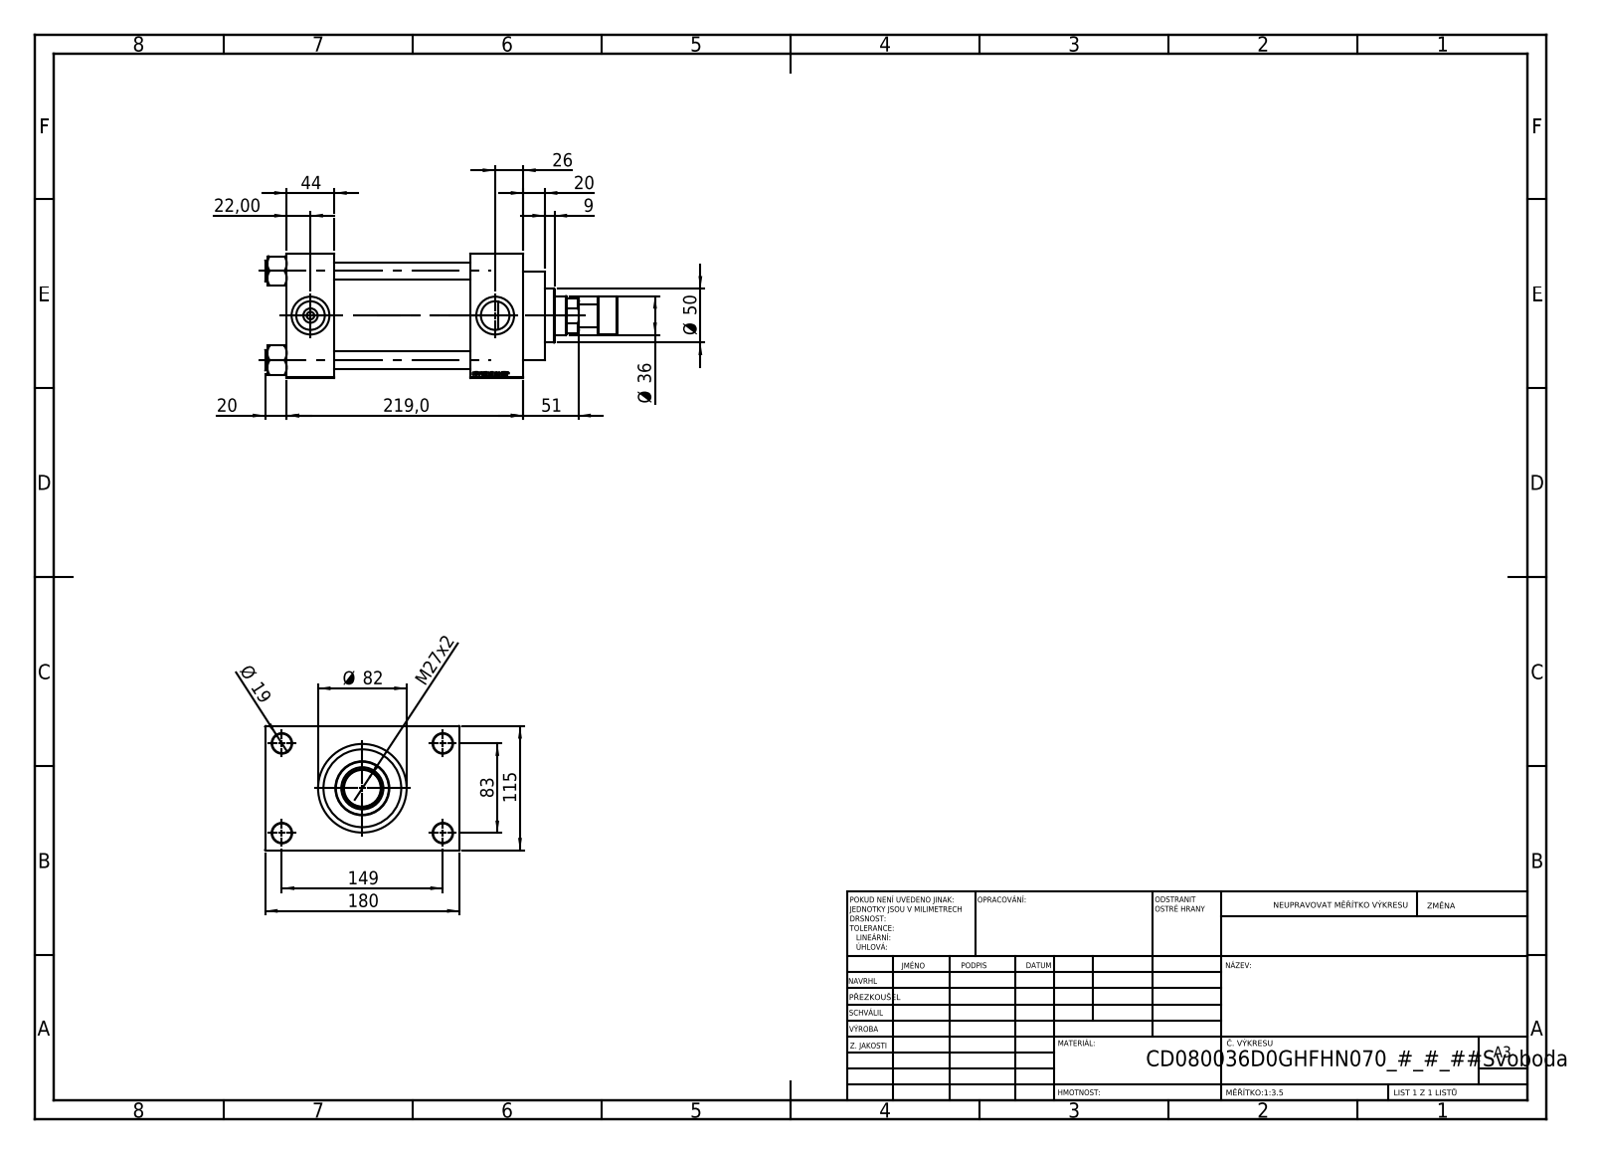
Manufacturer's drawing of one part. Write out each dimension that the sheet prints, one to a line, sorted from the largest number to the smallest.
219,0
180
149
115
83
Ø 82
51
Ø 50
44
Ø 36
M27x2
26
22,00
20
20
Ø 19
9
